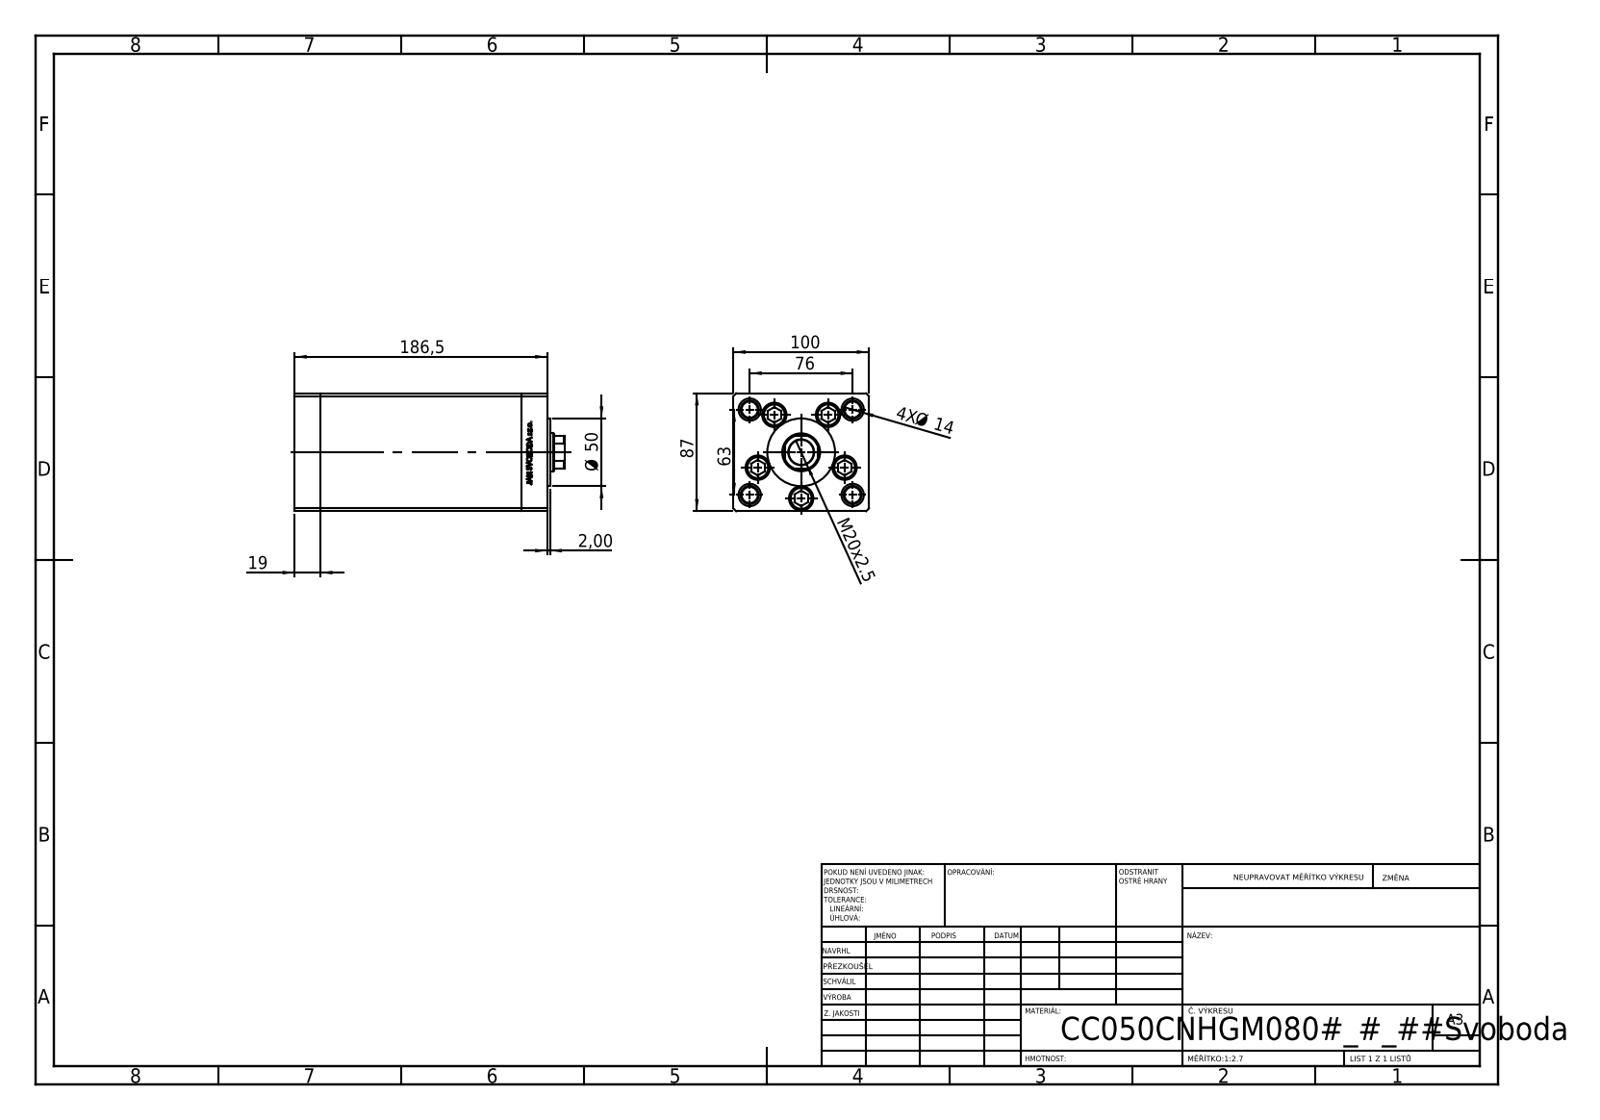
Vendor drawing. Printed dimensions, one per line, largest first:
186,5
100
87
76
63
Ø 50
M20x2.5
19
4X Ø 14
2,00
